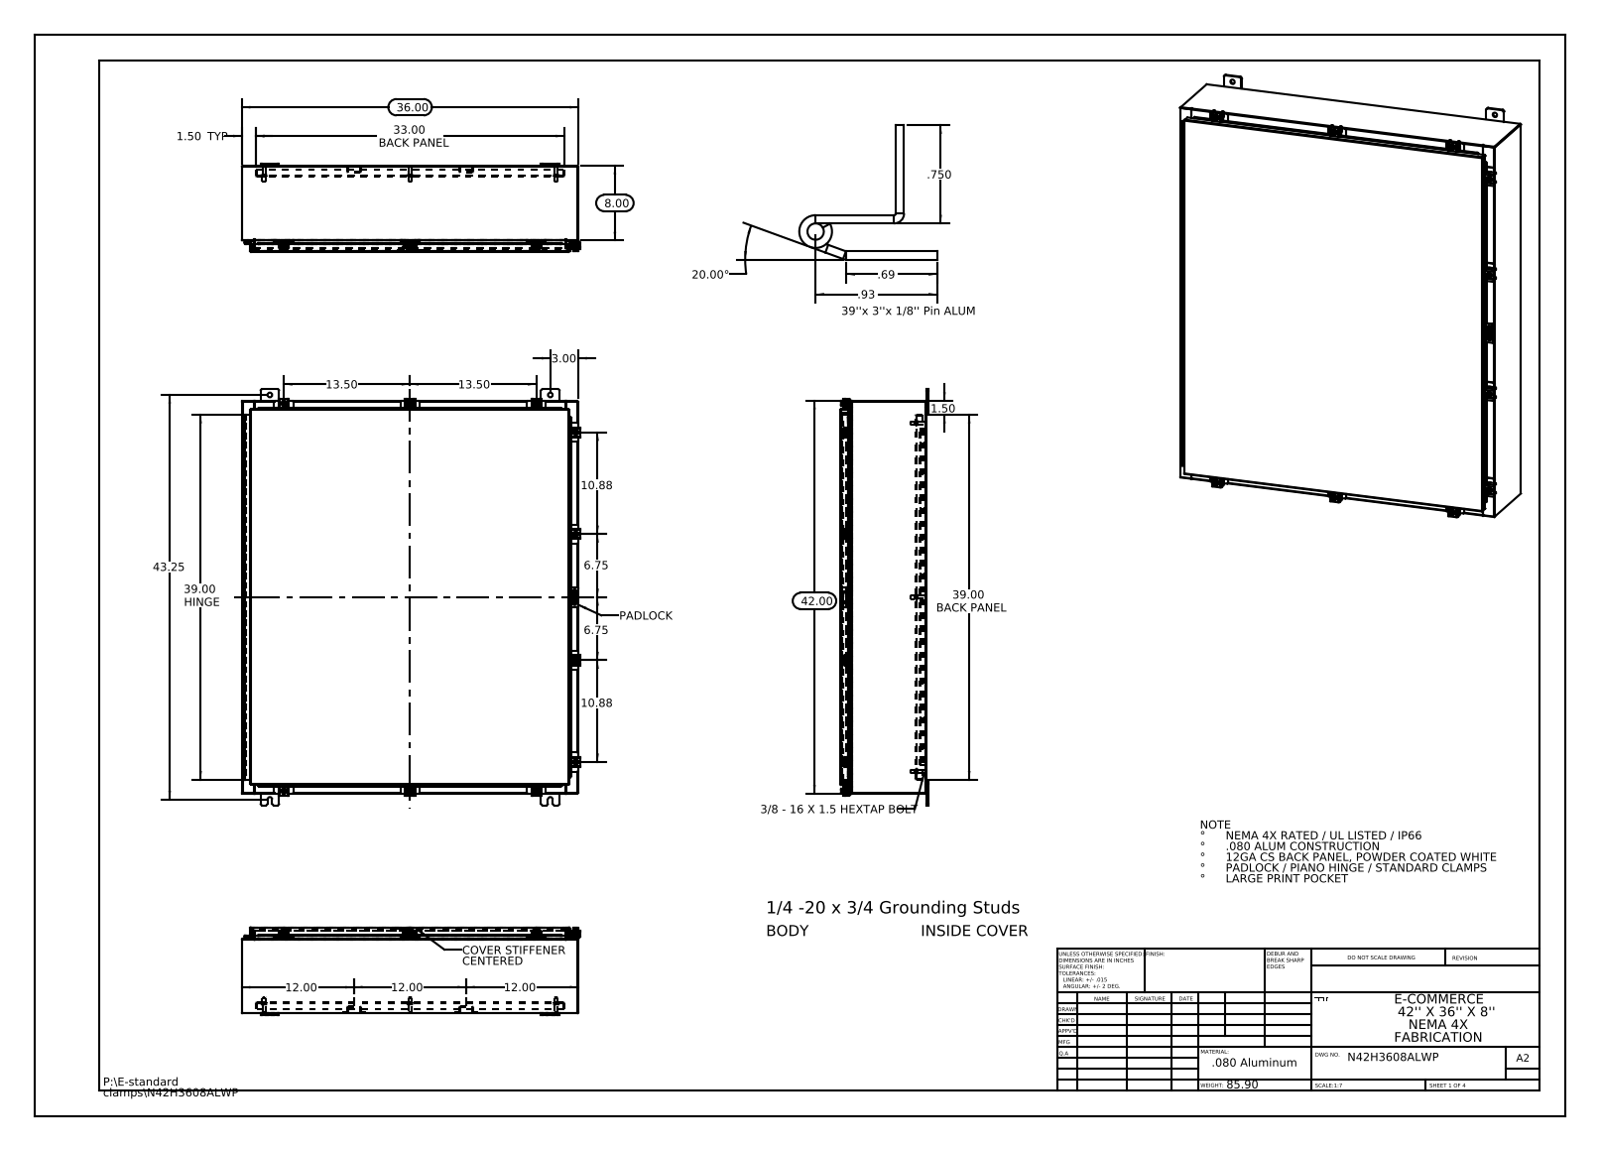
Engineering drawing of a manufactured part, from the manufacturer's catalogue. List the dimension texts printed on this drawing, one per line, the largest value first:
43.25
42.00
39.00 HINGE
39.00 BACK PANEL
36.00
33.00 BACK PANEL
20.00°
13.50
13.50
12.00
12.00
12.00
10.88
10.88
8.00
6.75
6.75
3.00
1.50 TYP
1.50
.93
.750
.69
